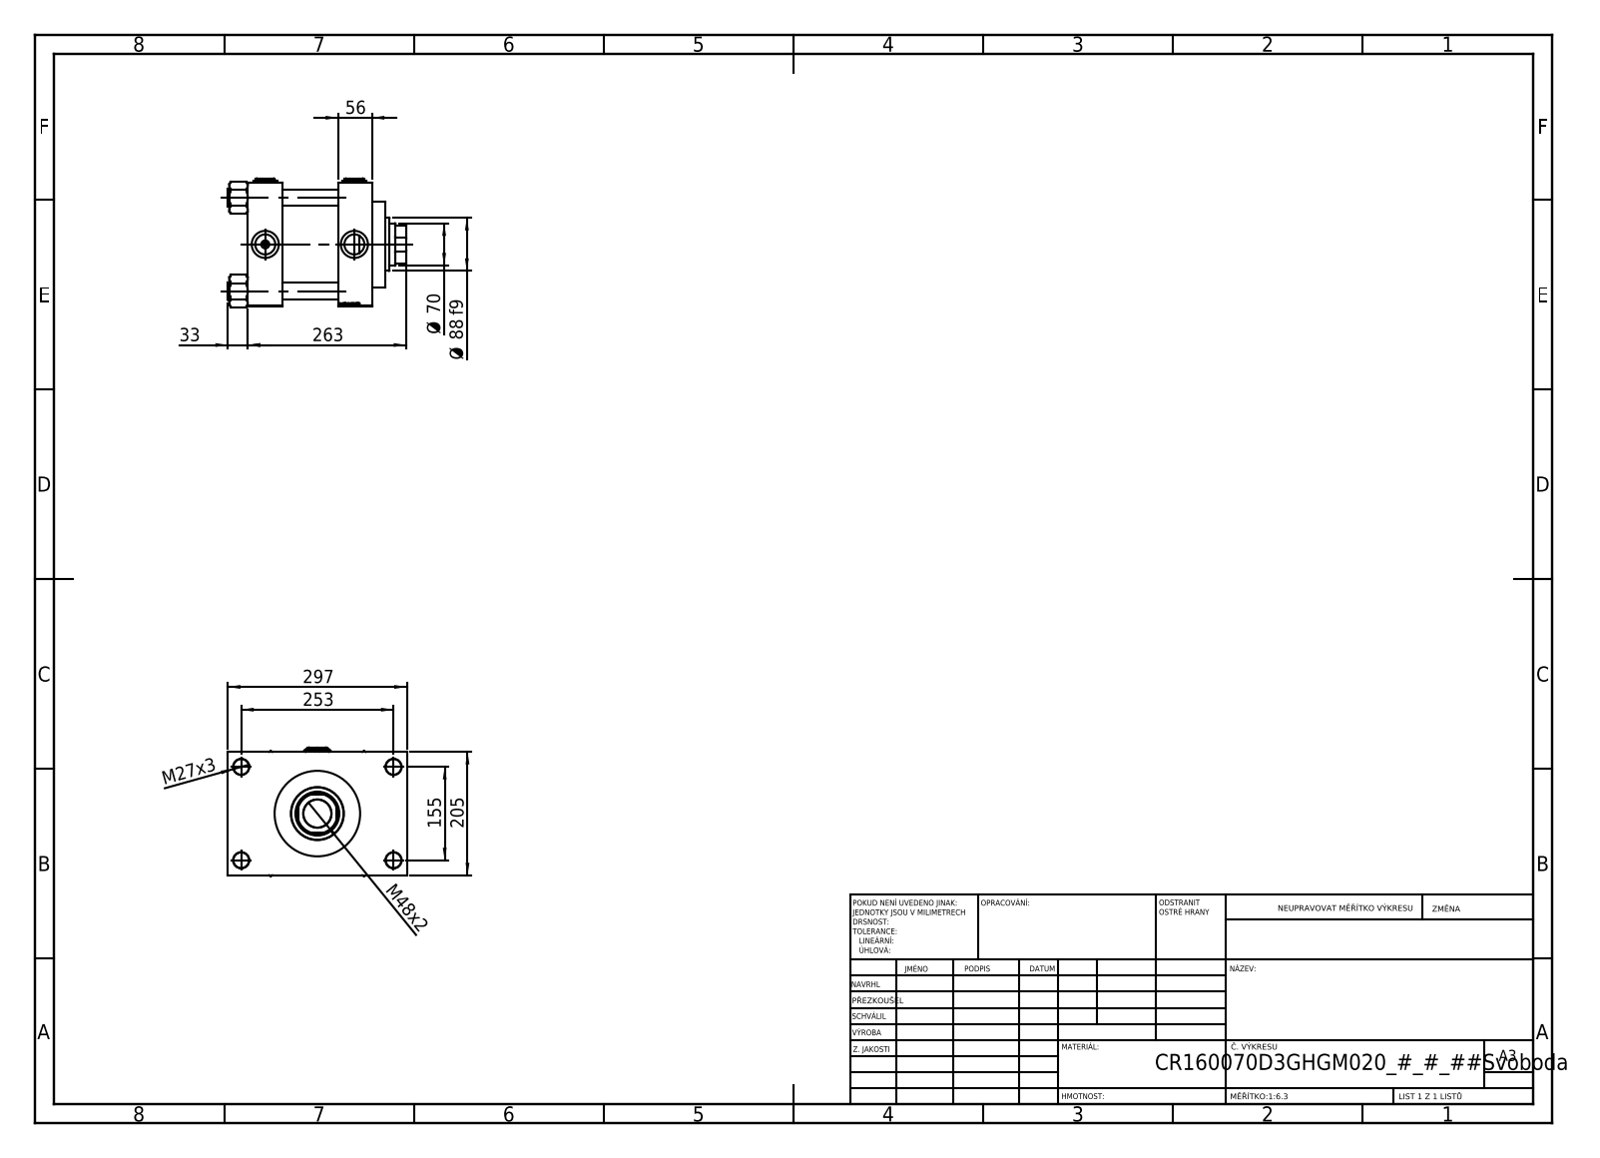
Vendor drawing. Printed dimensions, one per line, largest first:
297
263
253
205
155
Ø 88 f9
Ø 70
56
M48x2
33
M27x3
